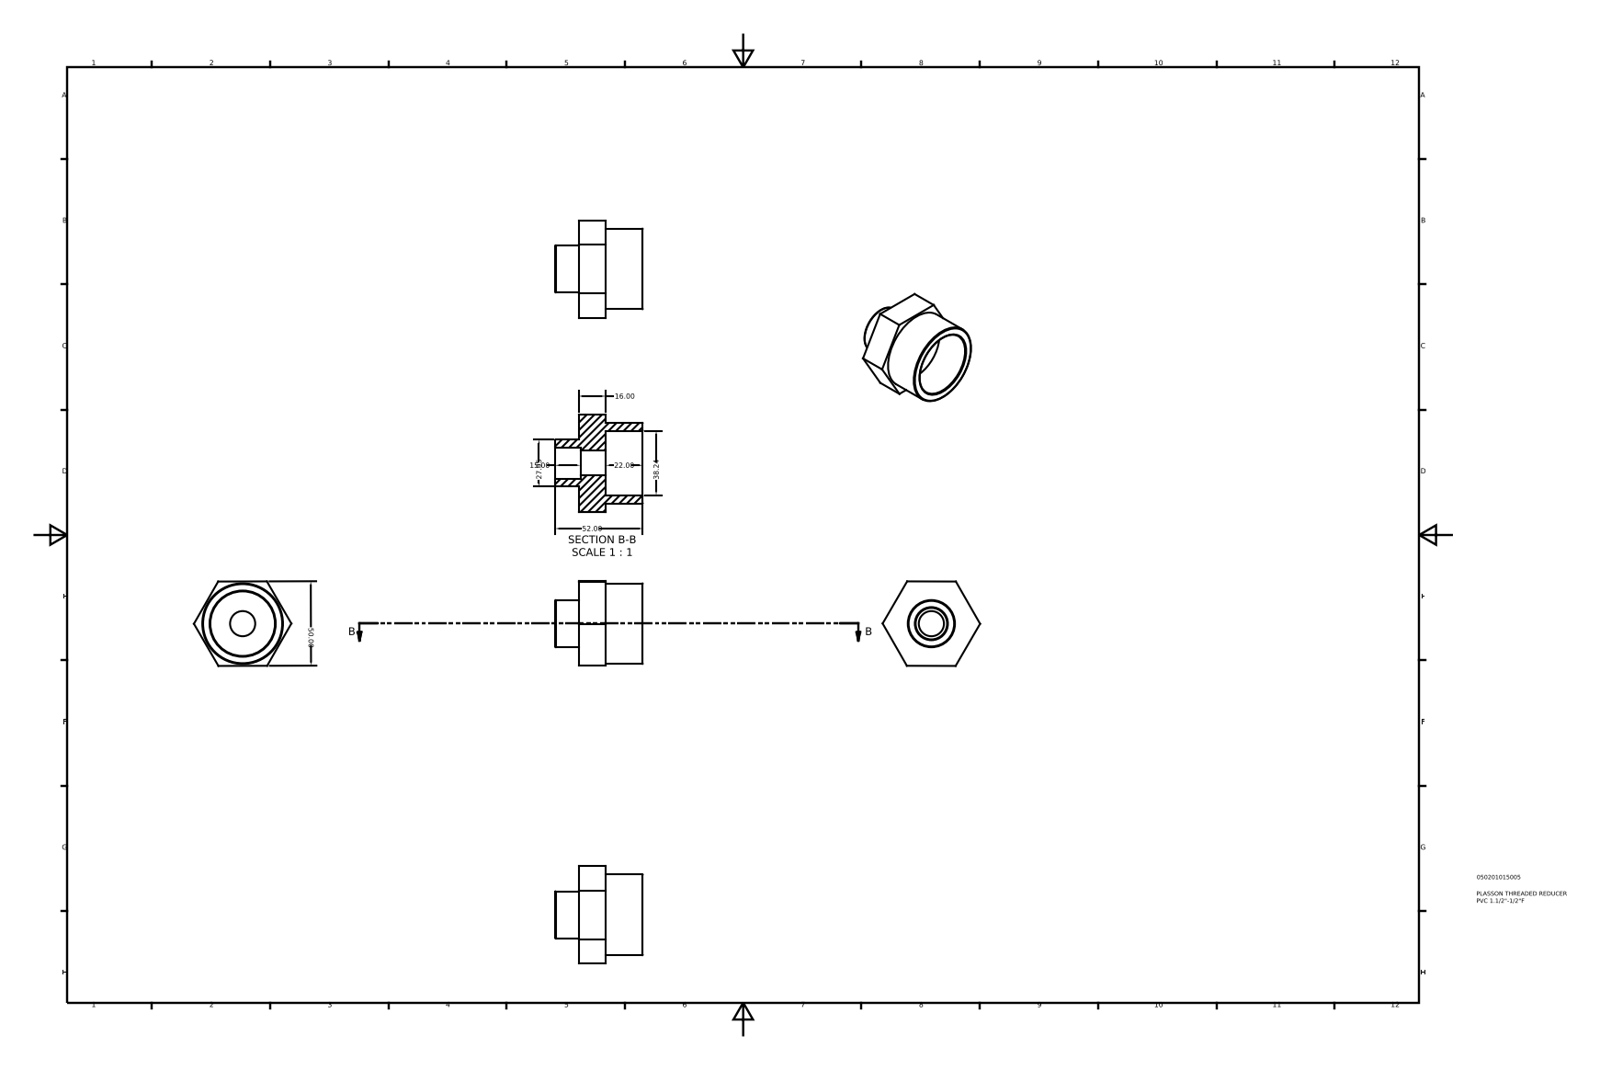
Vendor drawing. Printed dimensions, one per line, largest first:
52.00
50.00
38.24
27.95
22.00
16.00
15.00
